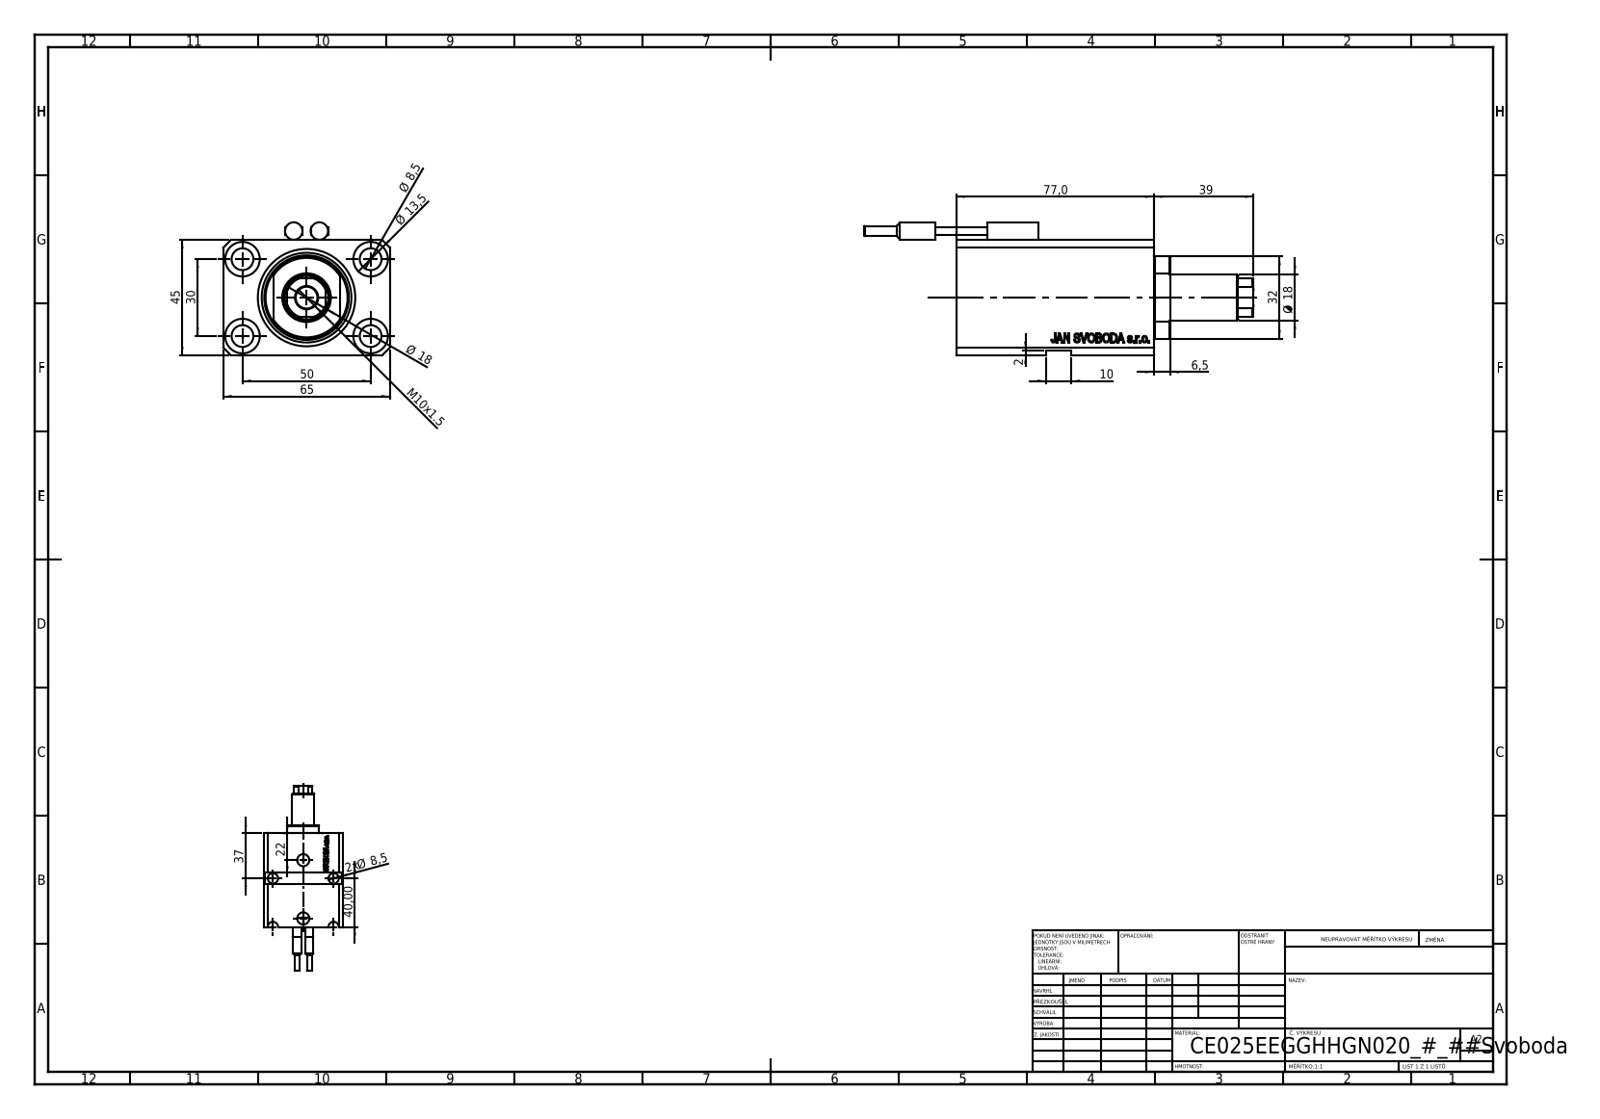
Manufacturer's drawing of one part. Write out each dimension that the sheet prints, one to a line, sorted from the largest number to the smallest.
77,0
65
50
45
40,00
39
37
32
30
22
Ø 18
Ø 18
Ø 13,5
M10x1.5
10
Ø 8,5
2x Ø 8,5
6,5
2
